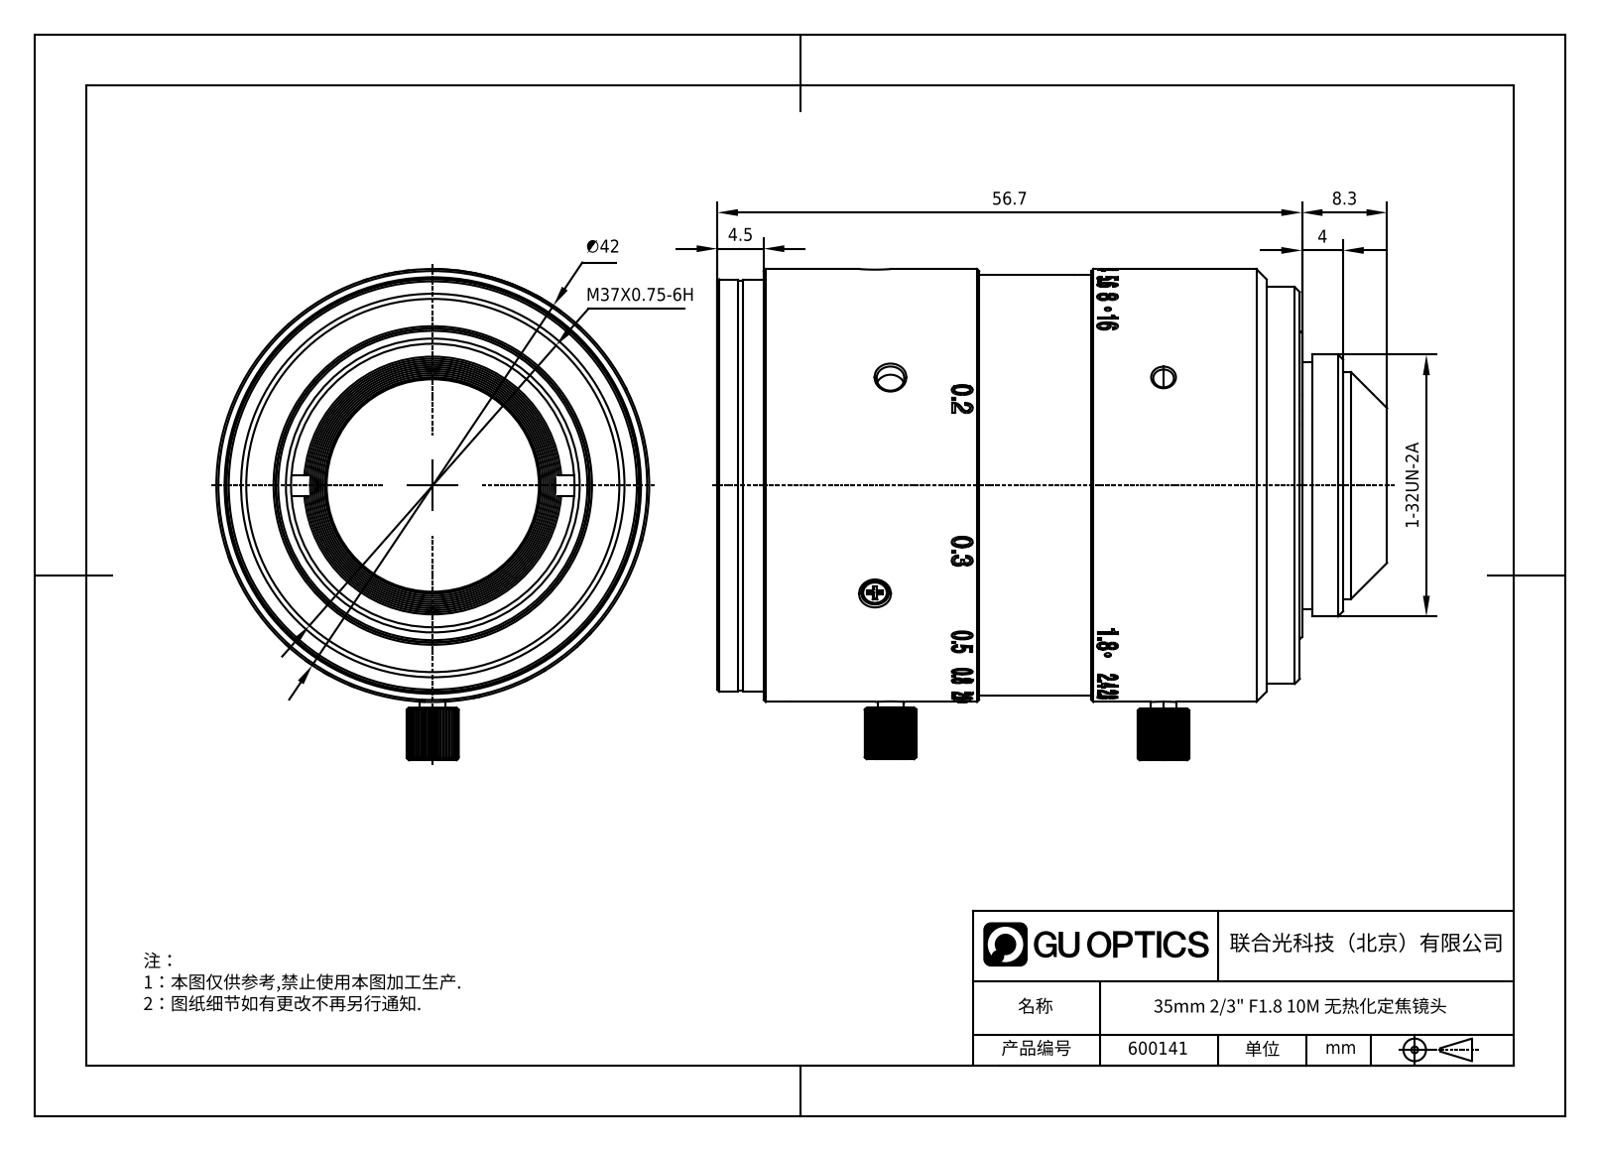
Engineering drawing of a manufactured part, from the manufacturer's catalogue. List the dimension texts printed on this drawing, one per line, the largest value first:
56.7
∅42
M37X0.75-6H
8.3
4.5
4
1-32UN-2A
